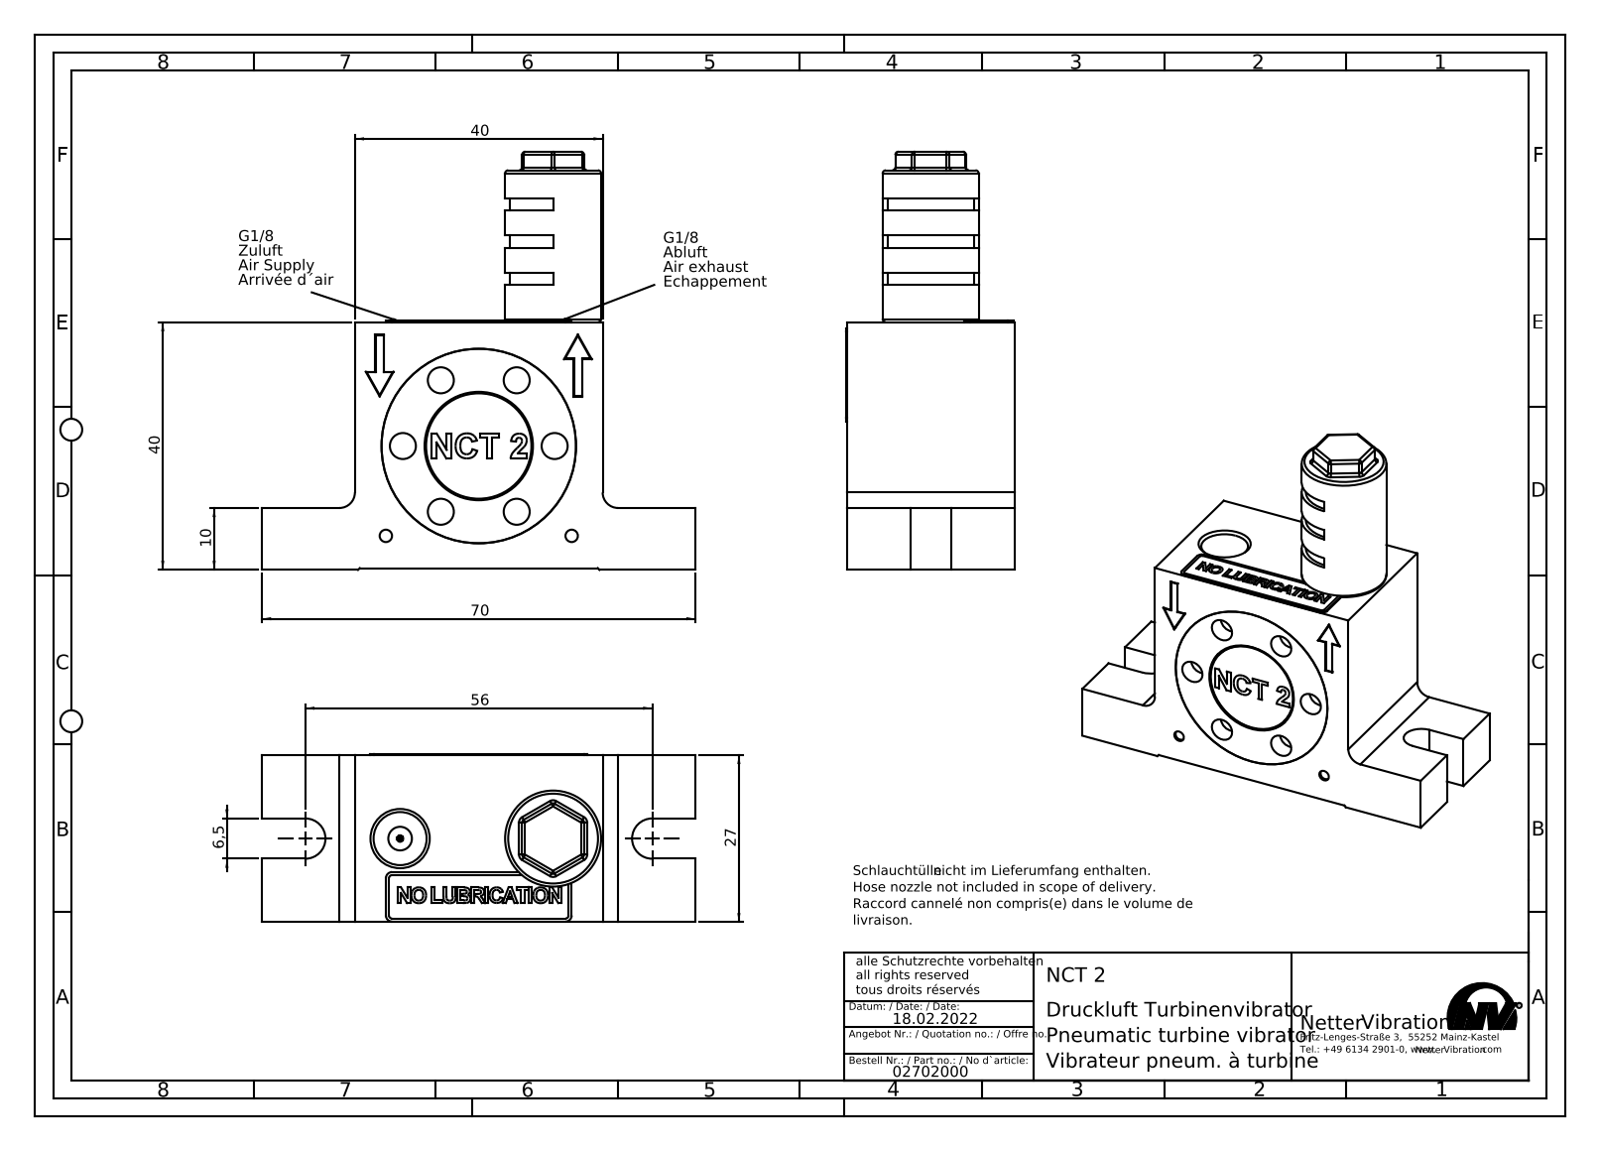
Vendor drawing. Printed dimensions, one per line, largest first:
70
56
40
40
27
10
6,5
